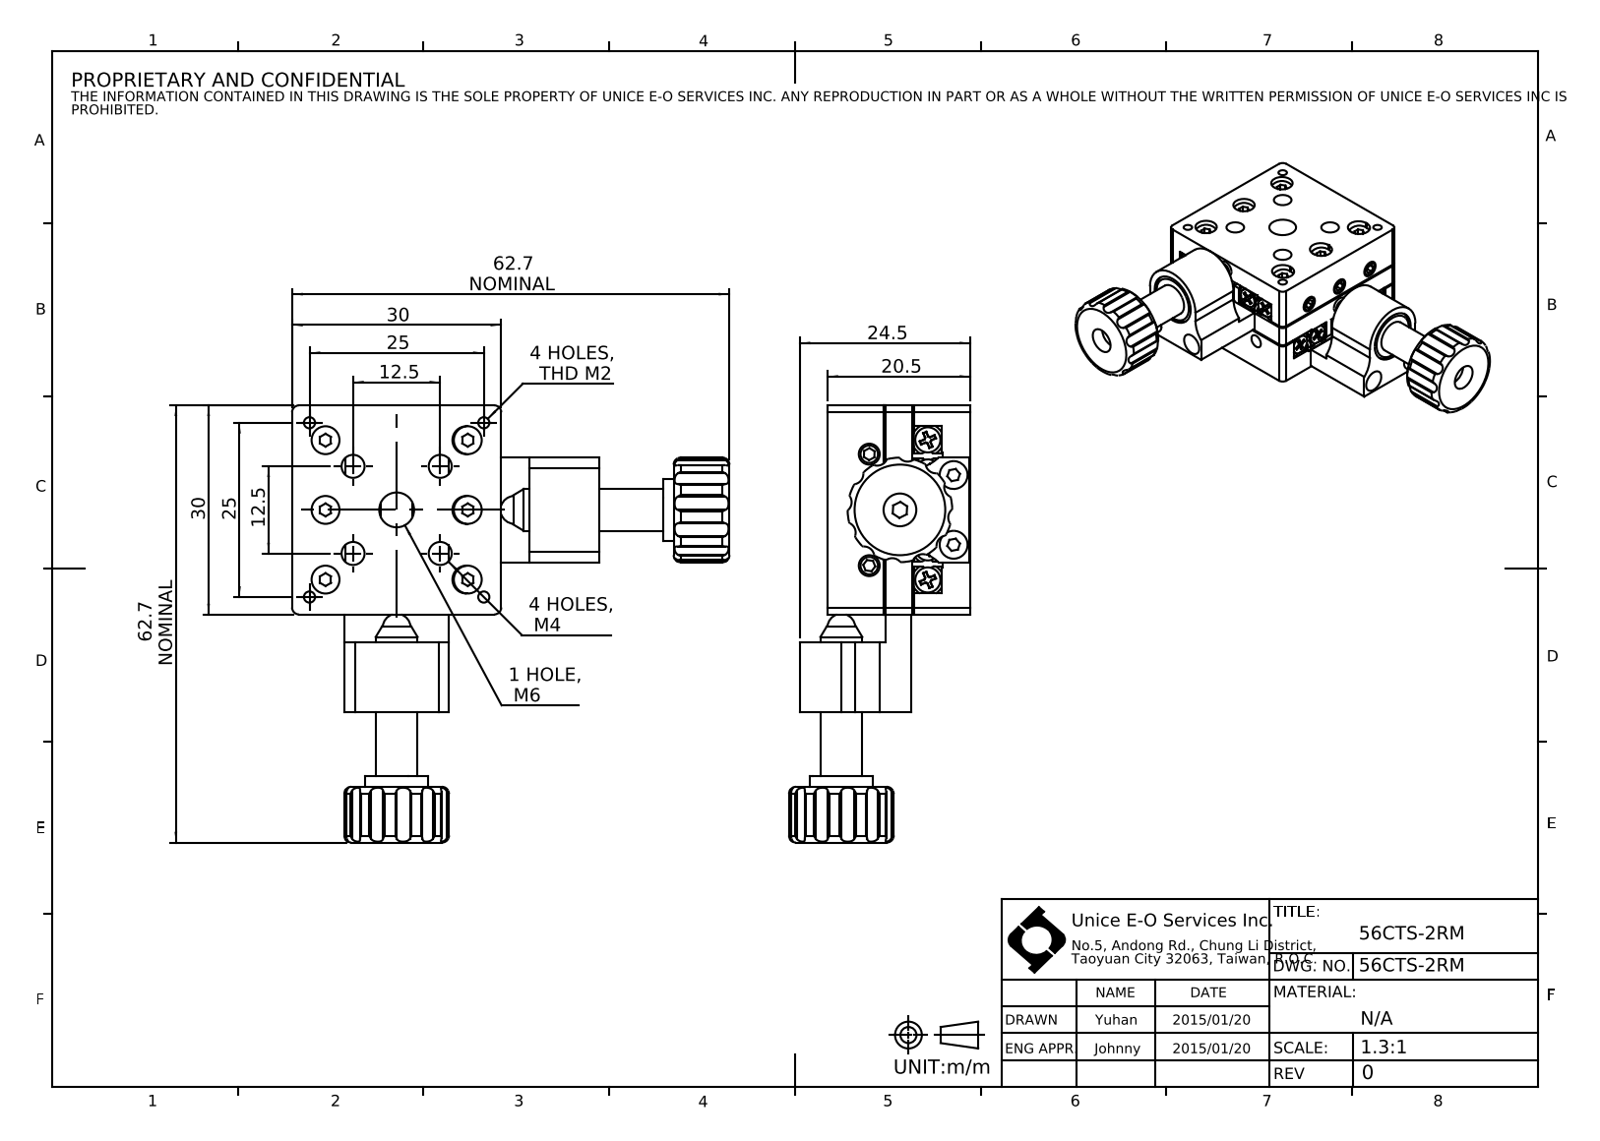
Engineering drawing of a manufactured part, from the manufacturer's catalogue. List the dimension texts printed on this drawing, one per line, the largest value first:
62.7 NOMINAL
62.7 NOMINAL
30
30
25
25
24.5
20.5
12.5
12.5
4 HOLES, M4
4 HOLES, THD M2
1 HOLE, M6
